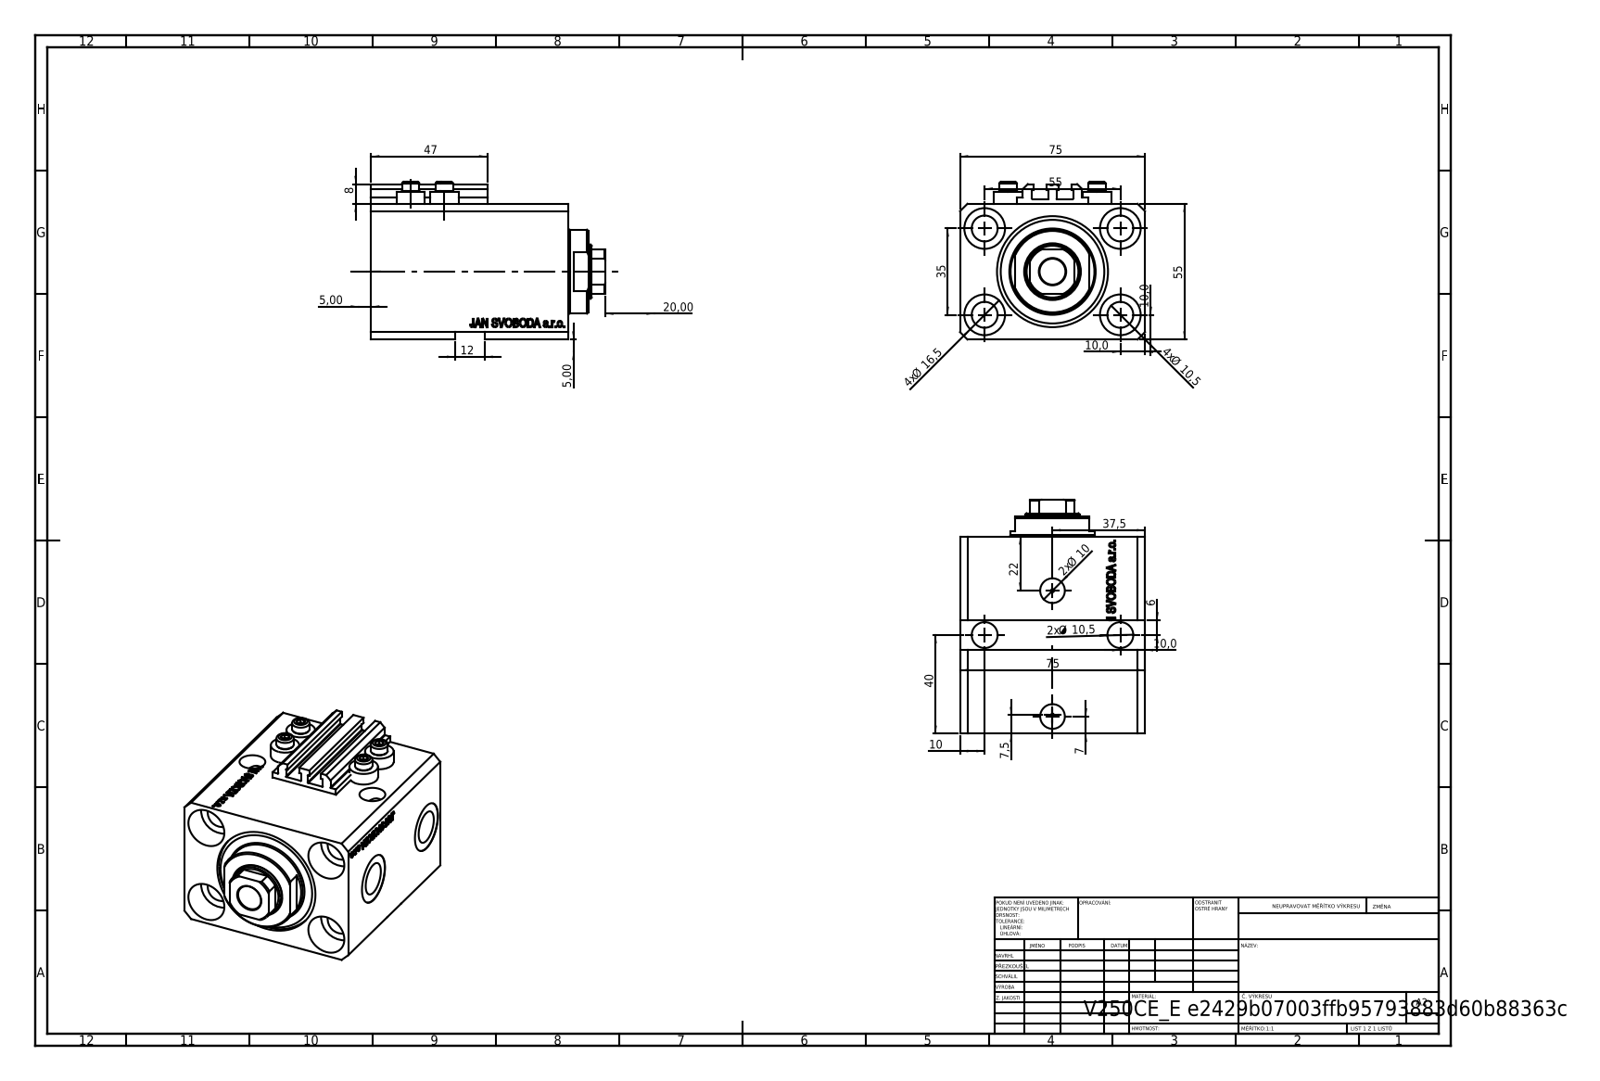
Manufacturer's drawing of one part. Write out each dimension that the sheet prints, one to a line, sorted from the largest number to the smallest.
75
75
55
55
47
40
37,5
35
22
20,00
4x Ø 16,5
12
4x Ø 10,5
2x Ø 10,5
10,0
10,0
2x Ø 10
10,0
10
8
7,5
7
6
5,00
5,00
